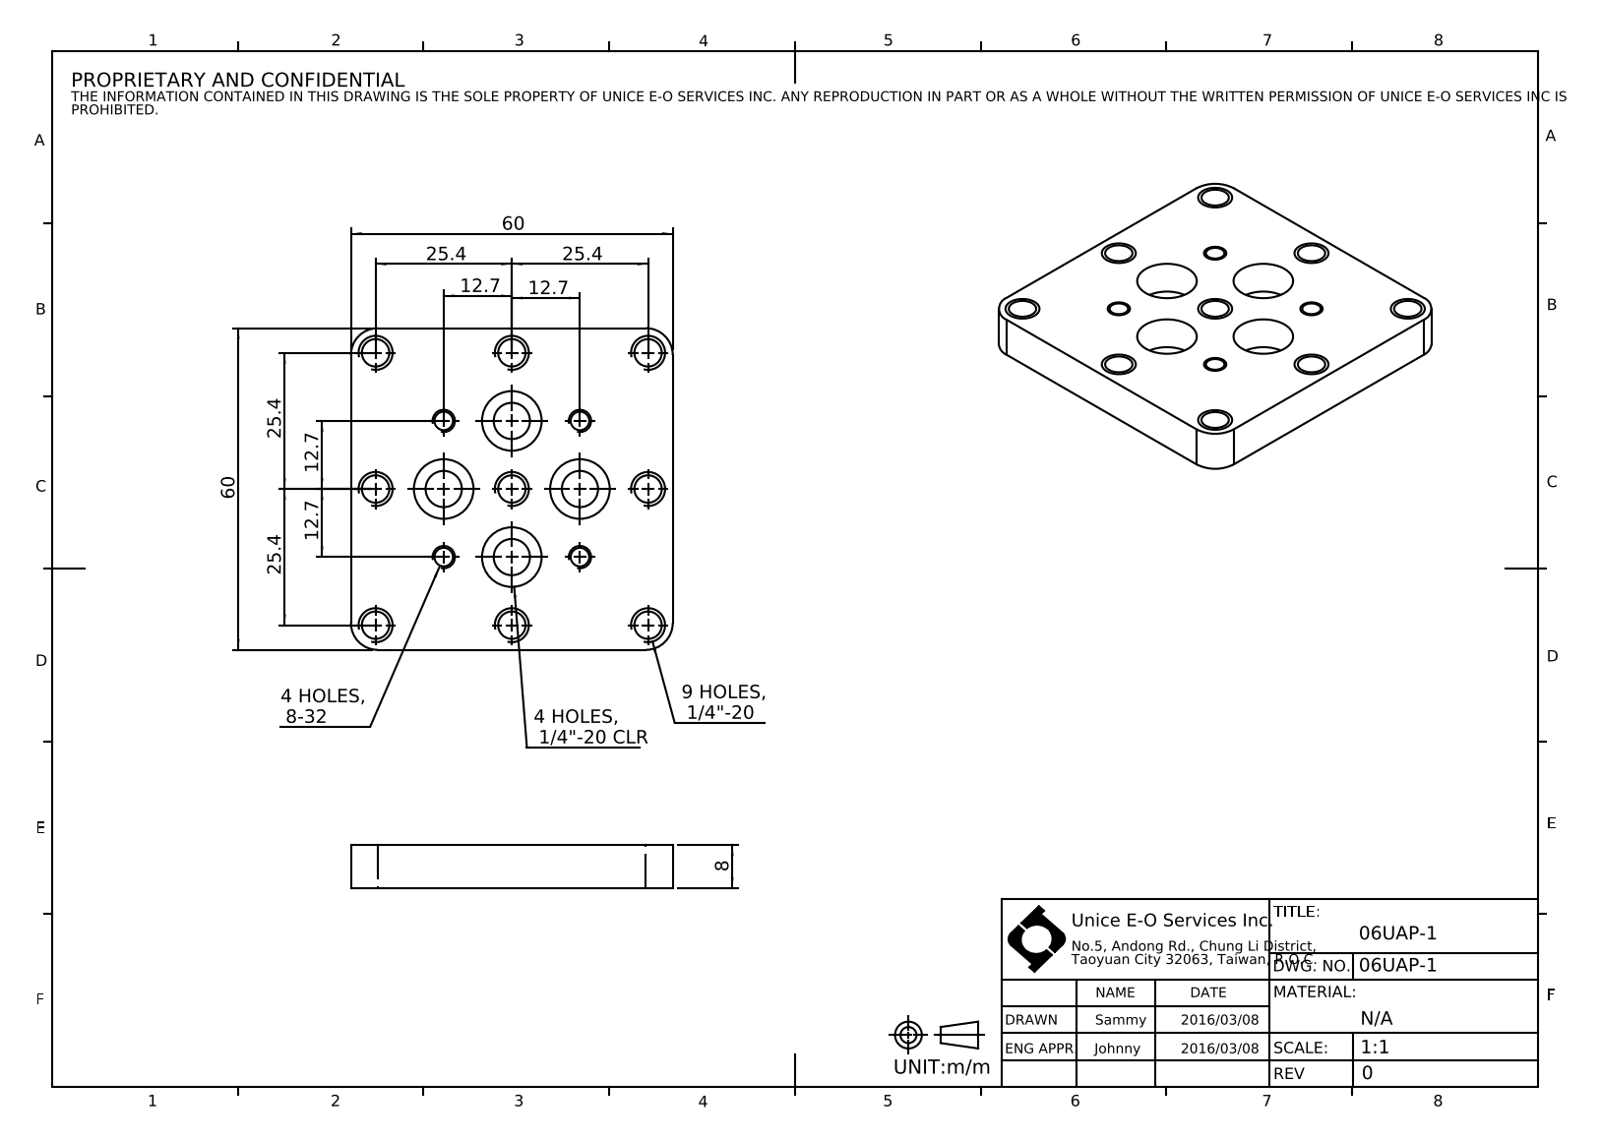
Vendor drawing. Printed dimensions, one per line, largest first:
60
60
25.4
25.4
25.4
25.4
12.7
12.7
12.7
12.7
9 HOLES, 1/4"-20
8
4 HOLES, 8-32
4 HOLES, 1/4"-20 CLR
